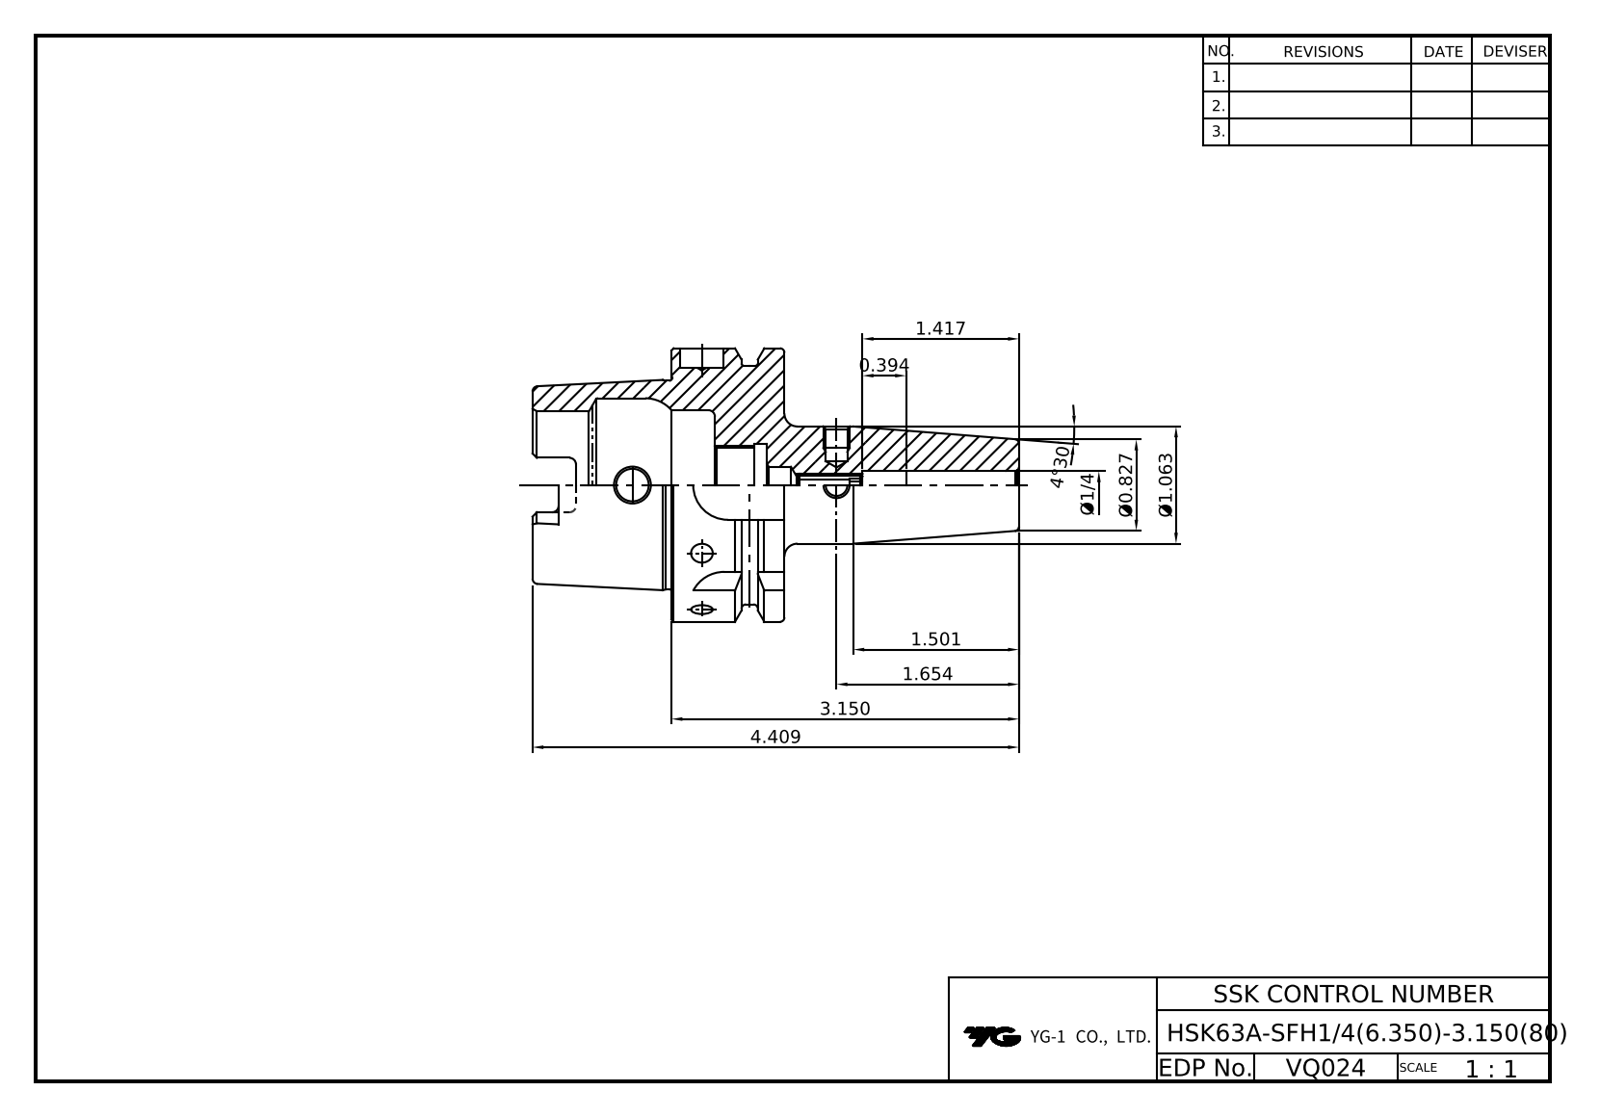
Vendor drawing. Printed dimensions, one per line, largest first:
4.409
4°30'
3.150
1.654
1.501
1.417
Ø1.063
Ø0.827
0.394
